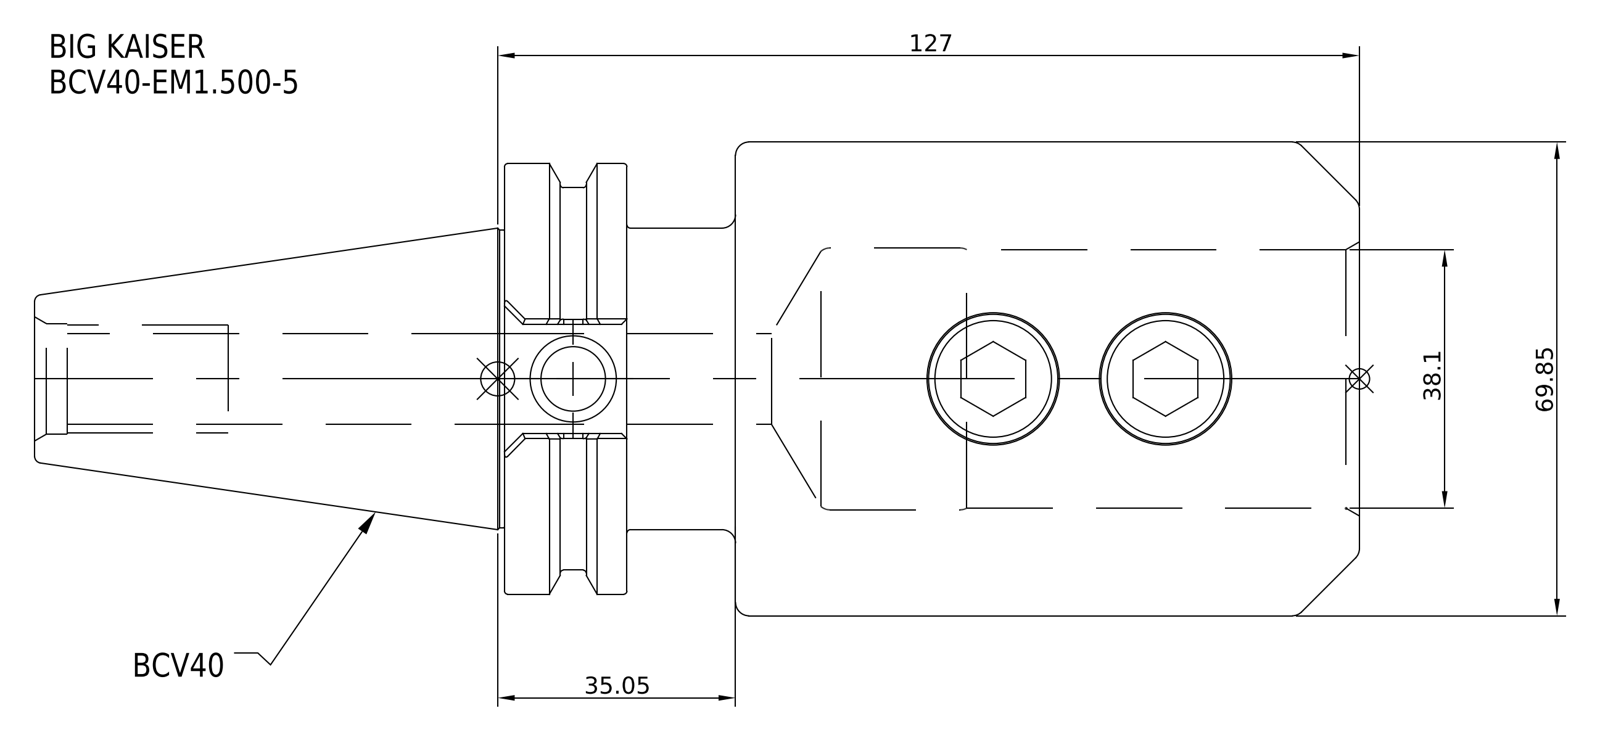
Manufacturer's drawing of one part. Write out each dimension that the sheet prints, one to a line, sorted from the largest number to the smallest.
127
69.85
38.1
35.05
